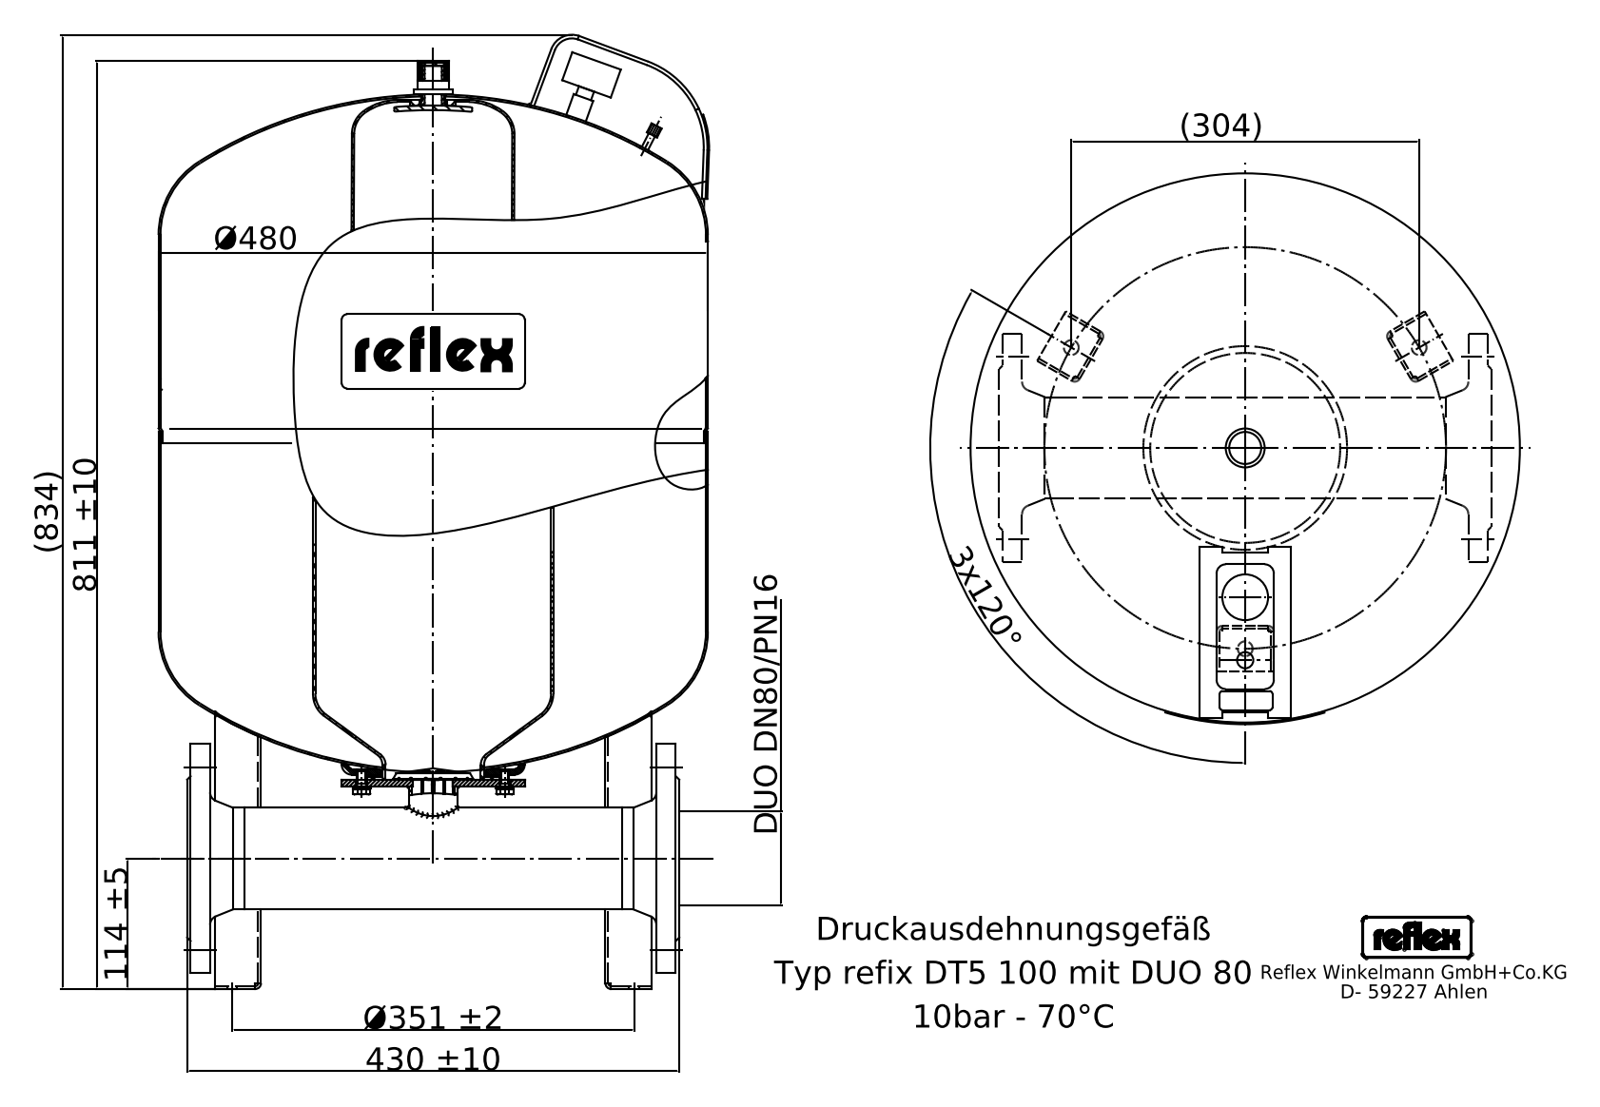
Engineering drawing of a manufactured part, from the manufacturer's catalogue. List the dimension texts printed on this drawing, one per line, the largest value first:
(834)
811 ±10
Ø480
430 ±10
Ø351 ±2
(304)
3x120°
114 ±5
DUO DN80/PN16
